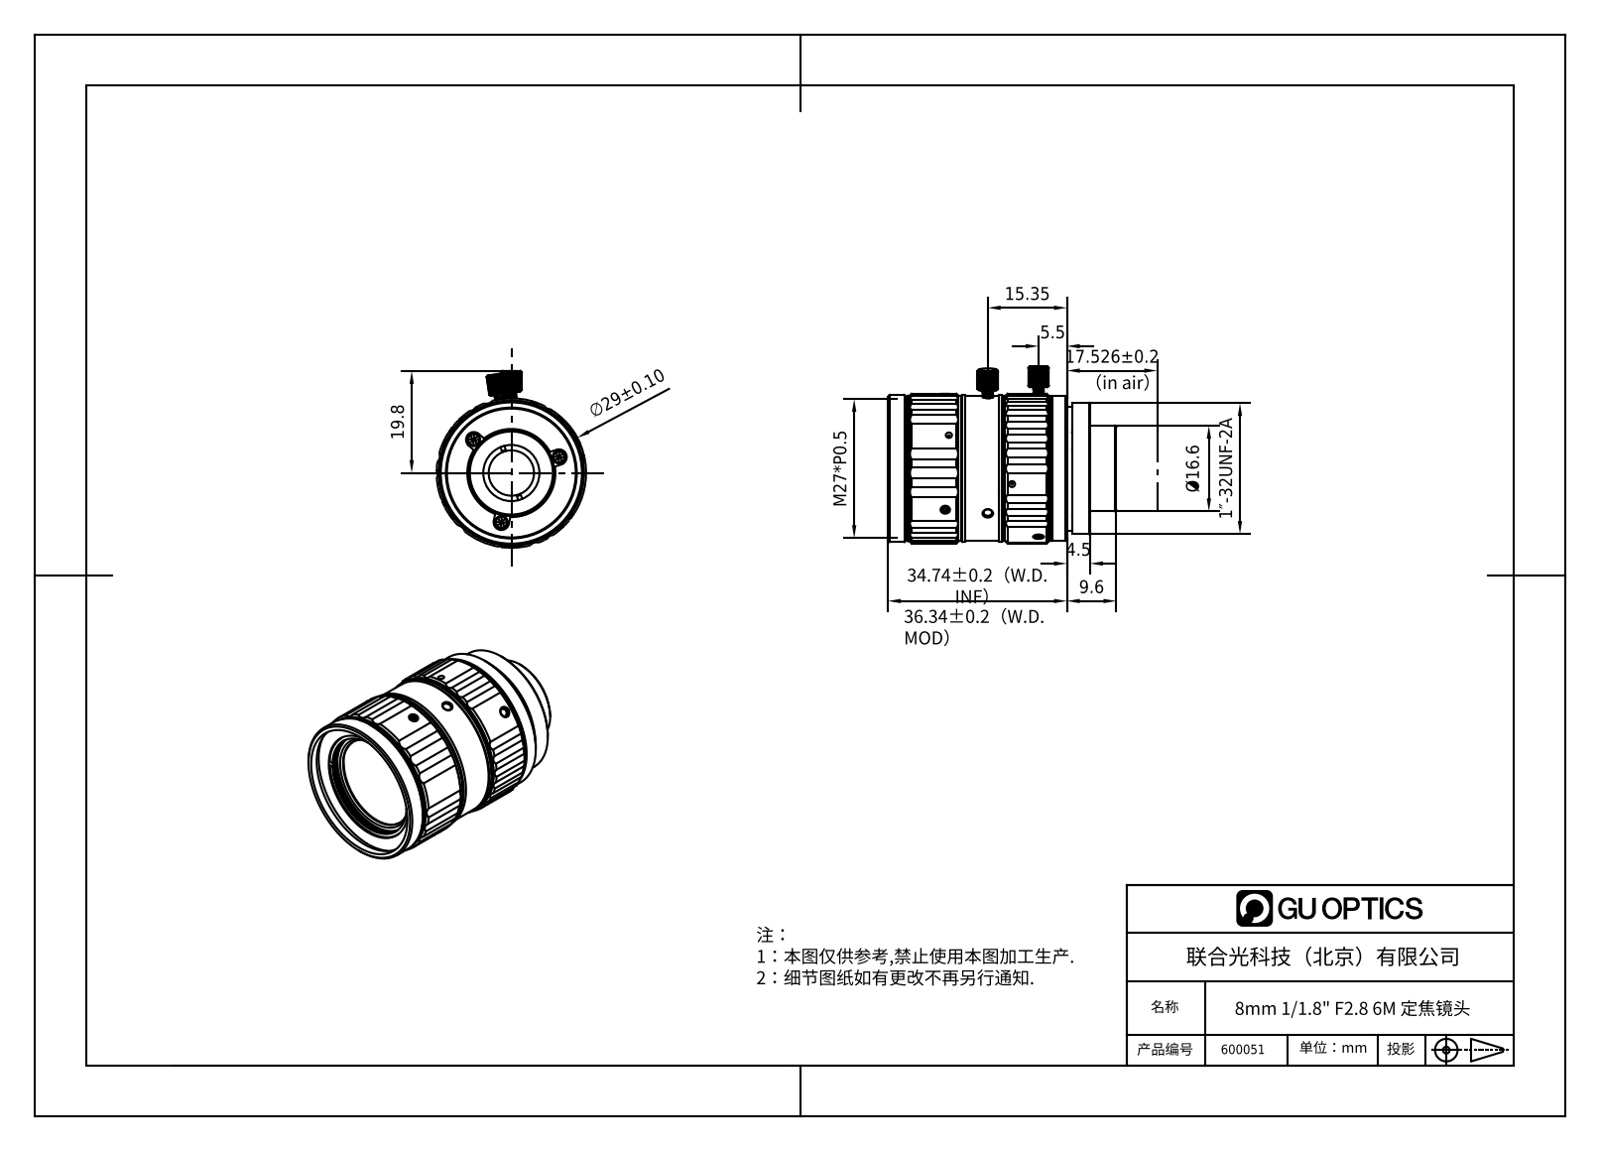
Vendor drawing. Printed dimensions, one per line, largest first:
34.74±0.2（W.D. INF）
M27*P0.5
19.8
17.526±0.2
Ø16.6
15.35
9.6
5.5
4.5
1″-32UNF-2A
±0.10
